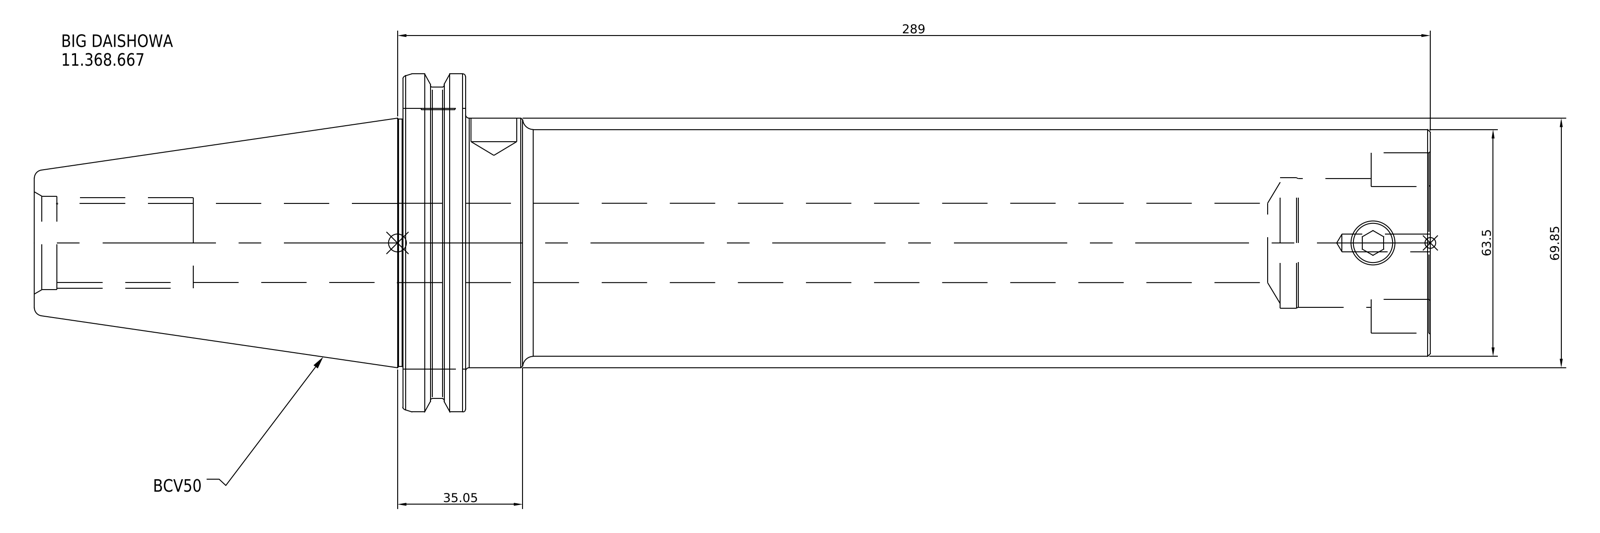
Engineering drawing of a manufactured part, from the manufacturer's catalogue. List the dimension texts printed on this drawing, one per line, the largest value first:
289
69.85
63.5
35.05
